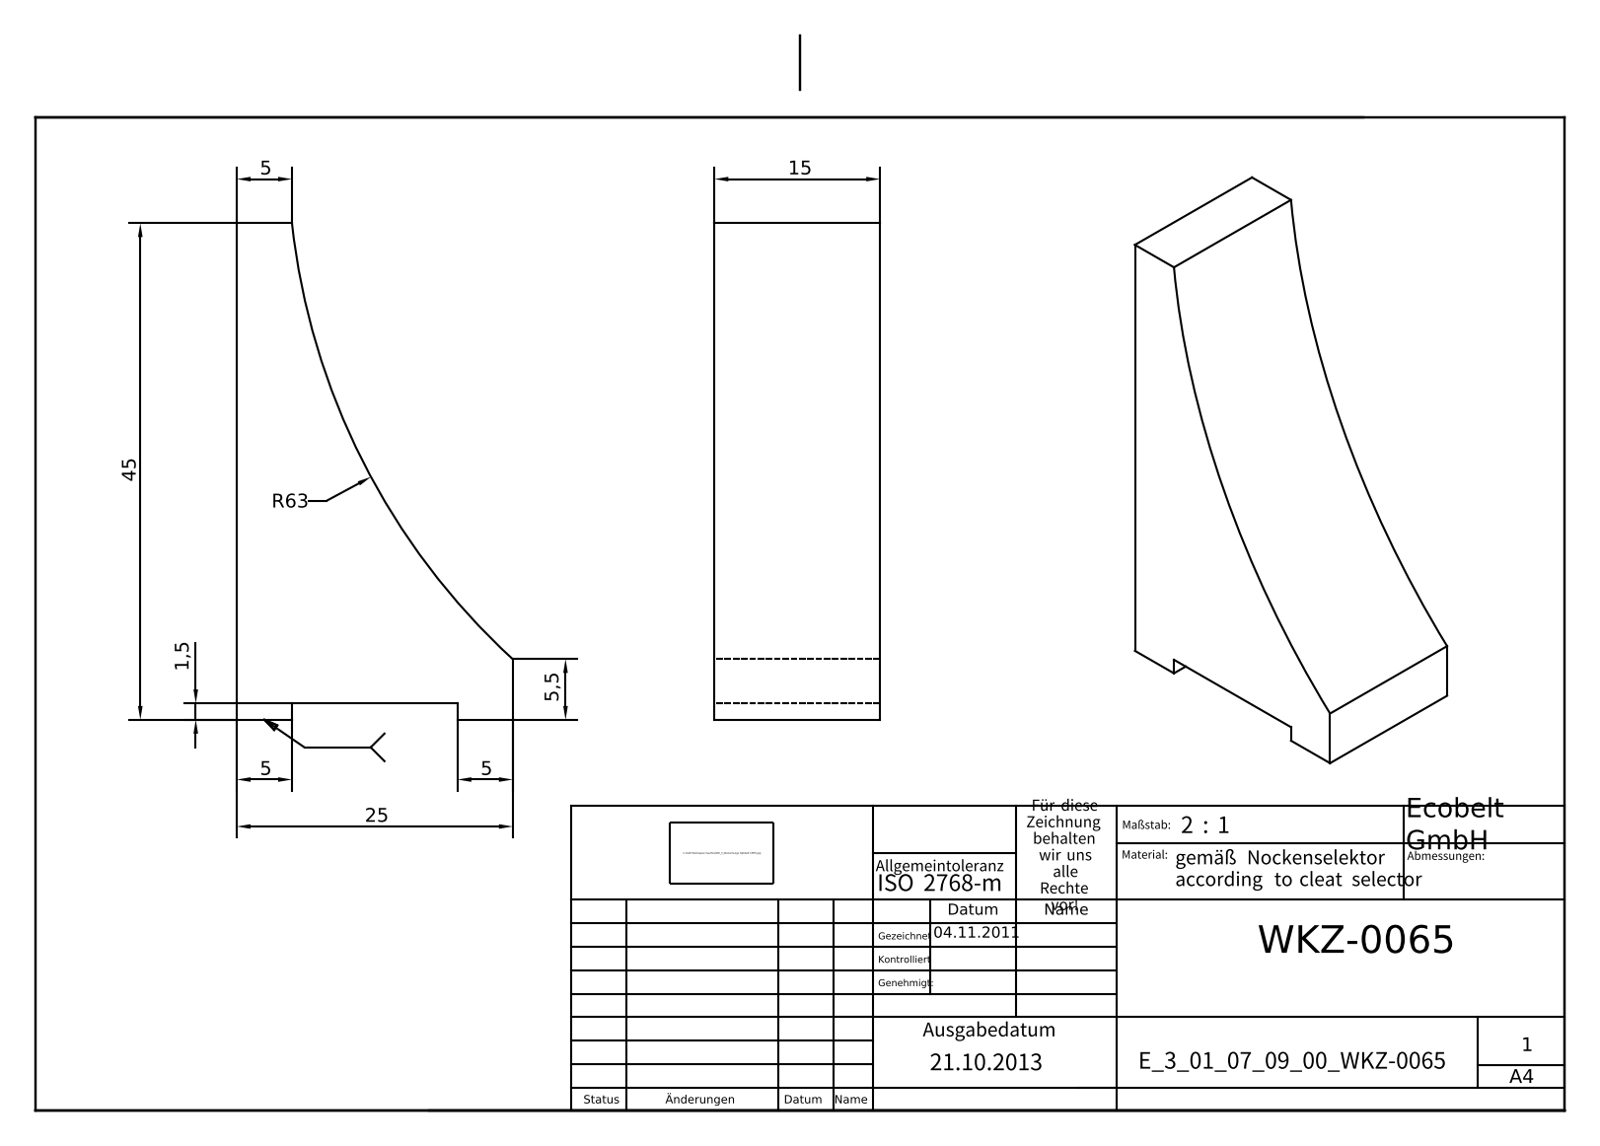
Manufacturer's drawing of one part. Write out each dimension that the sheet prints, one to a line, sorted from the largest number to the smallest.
R63
45
25
15
5,5
5
5
5
1,5
